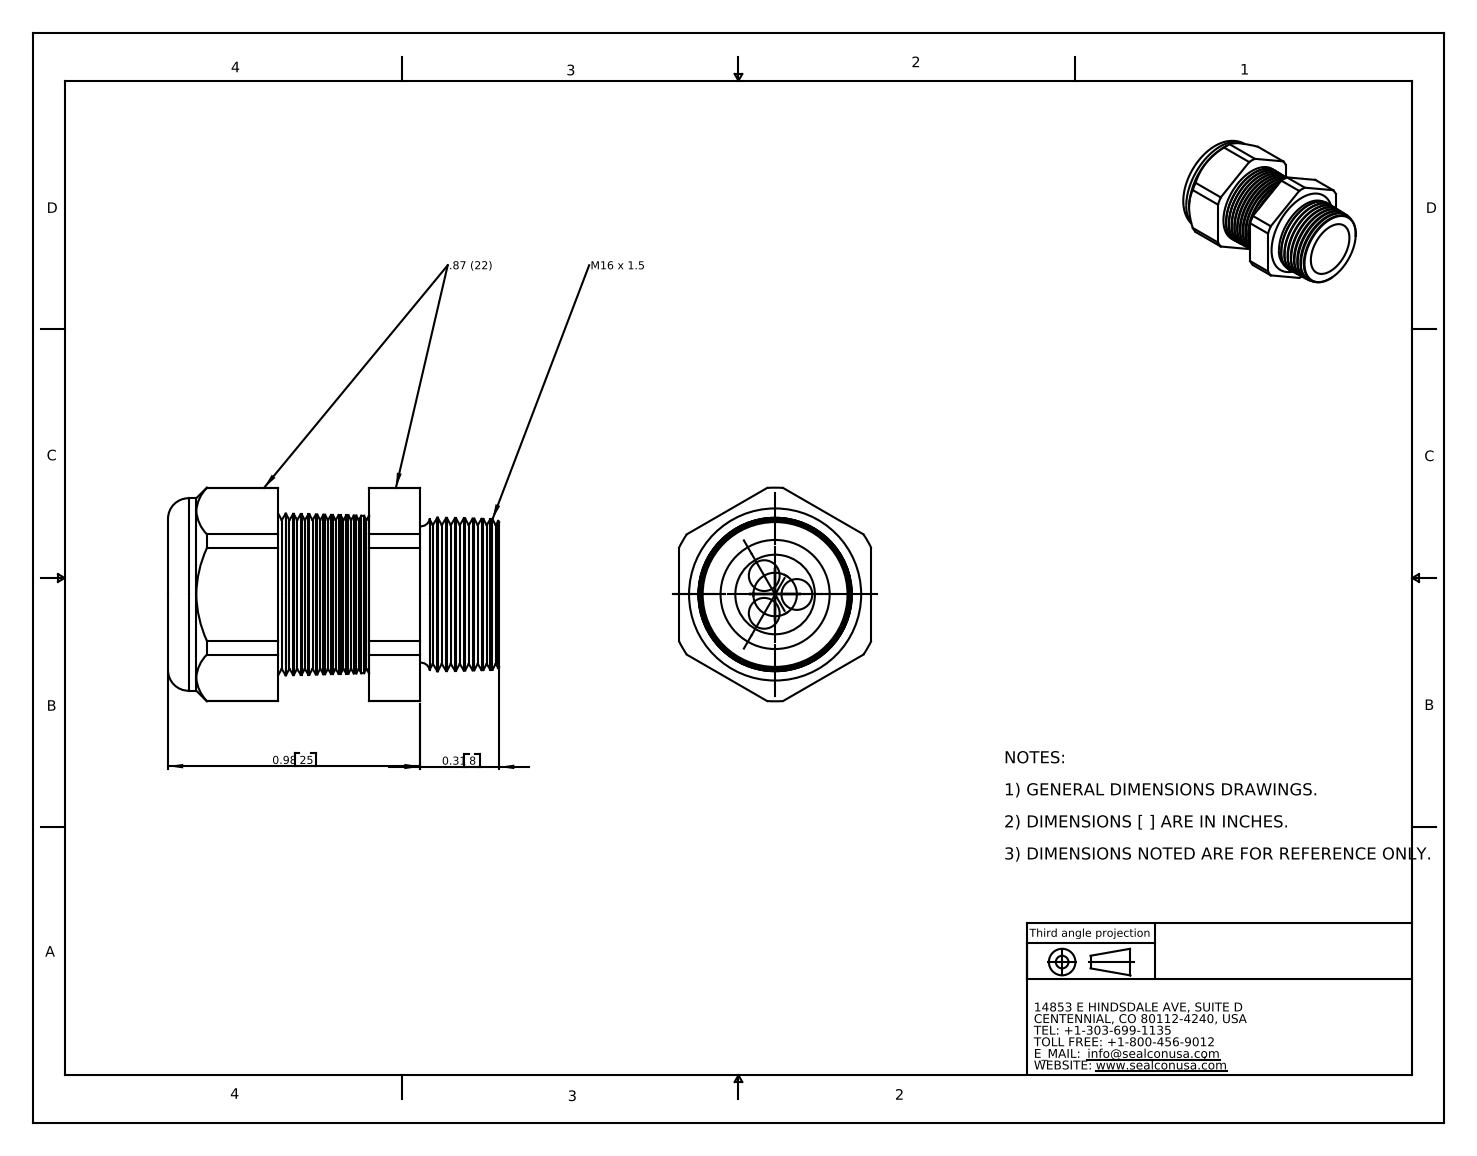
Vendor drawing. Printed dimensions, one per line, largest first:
0.98 25
0.31 8
